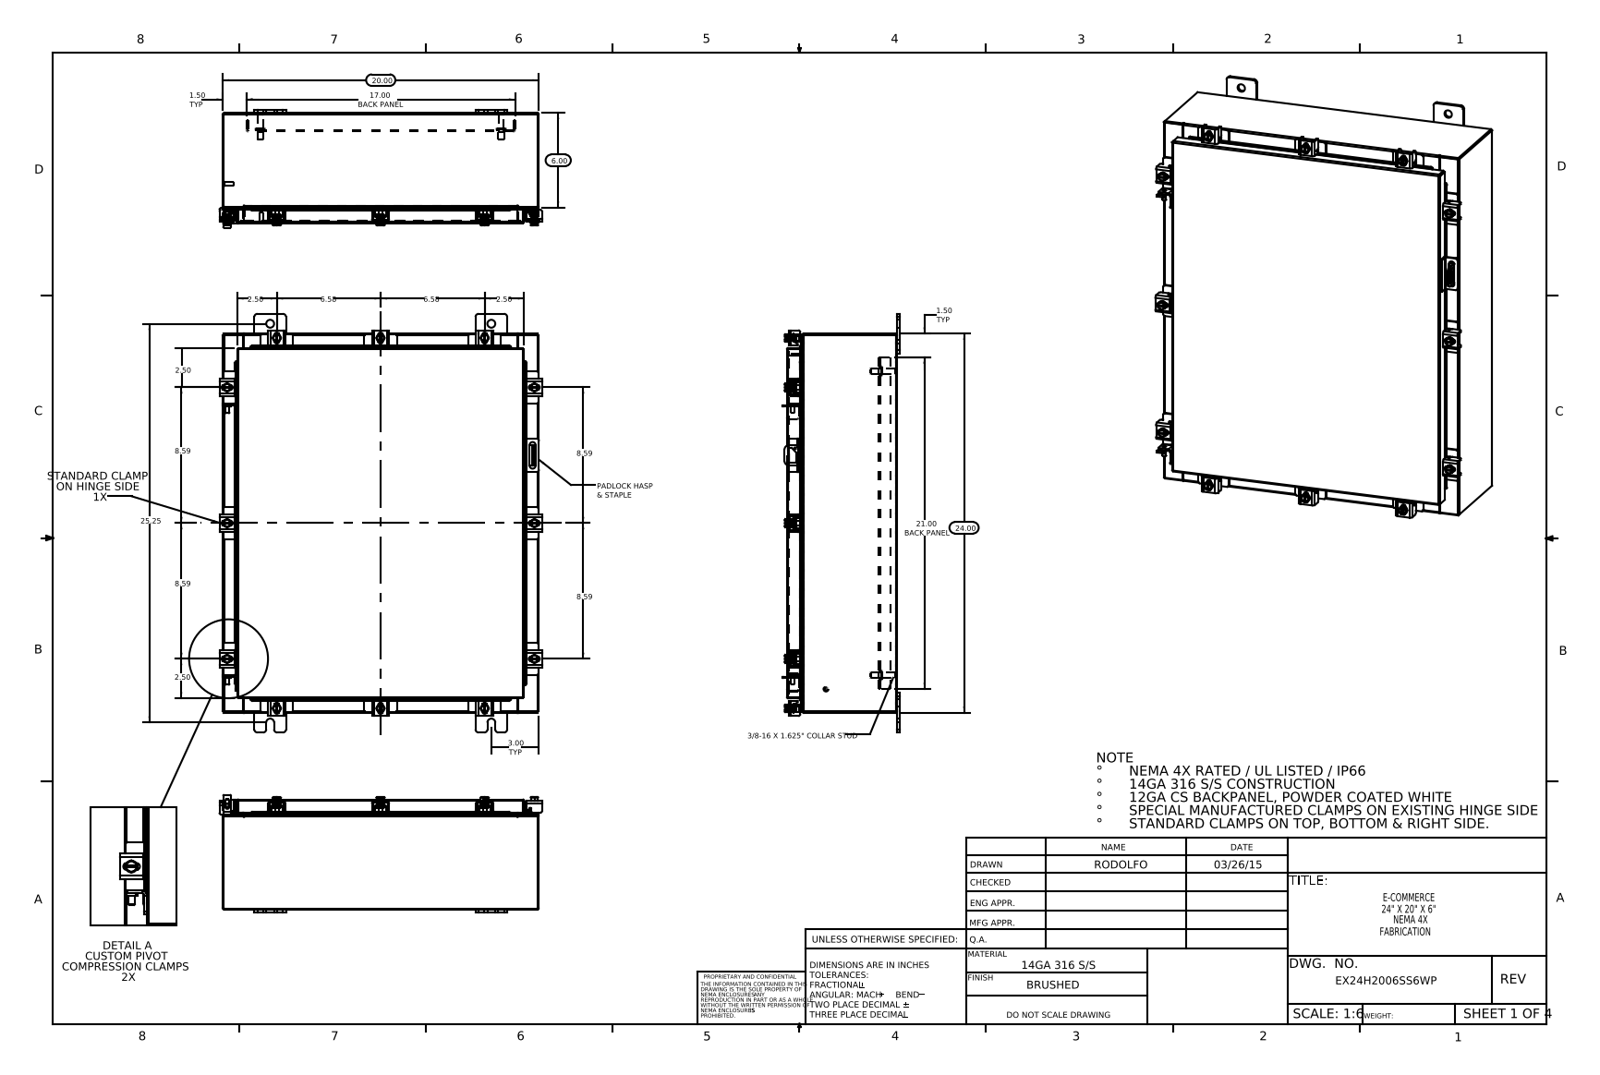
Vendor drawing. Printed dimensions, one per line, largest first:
25.25
24.00
21.00 BACK PANEL
20.00
17.00 BACK PANEL
8.59
8.59
8.59
8.59
6.58
6.58
6.00
3.00 TYP
2.50
2.50
2.50
2.50
1.50 TYP
1.50 TYP
